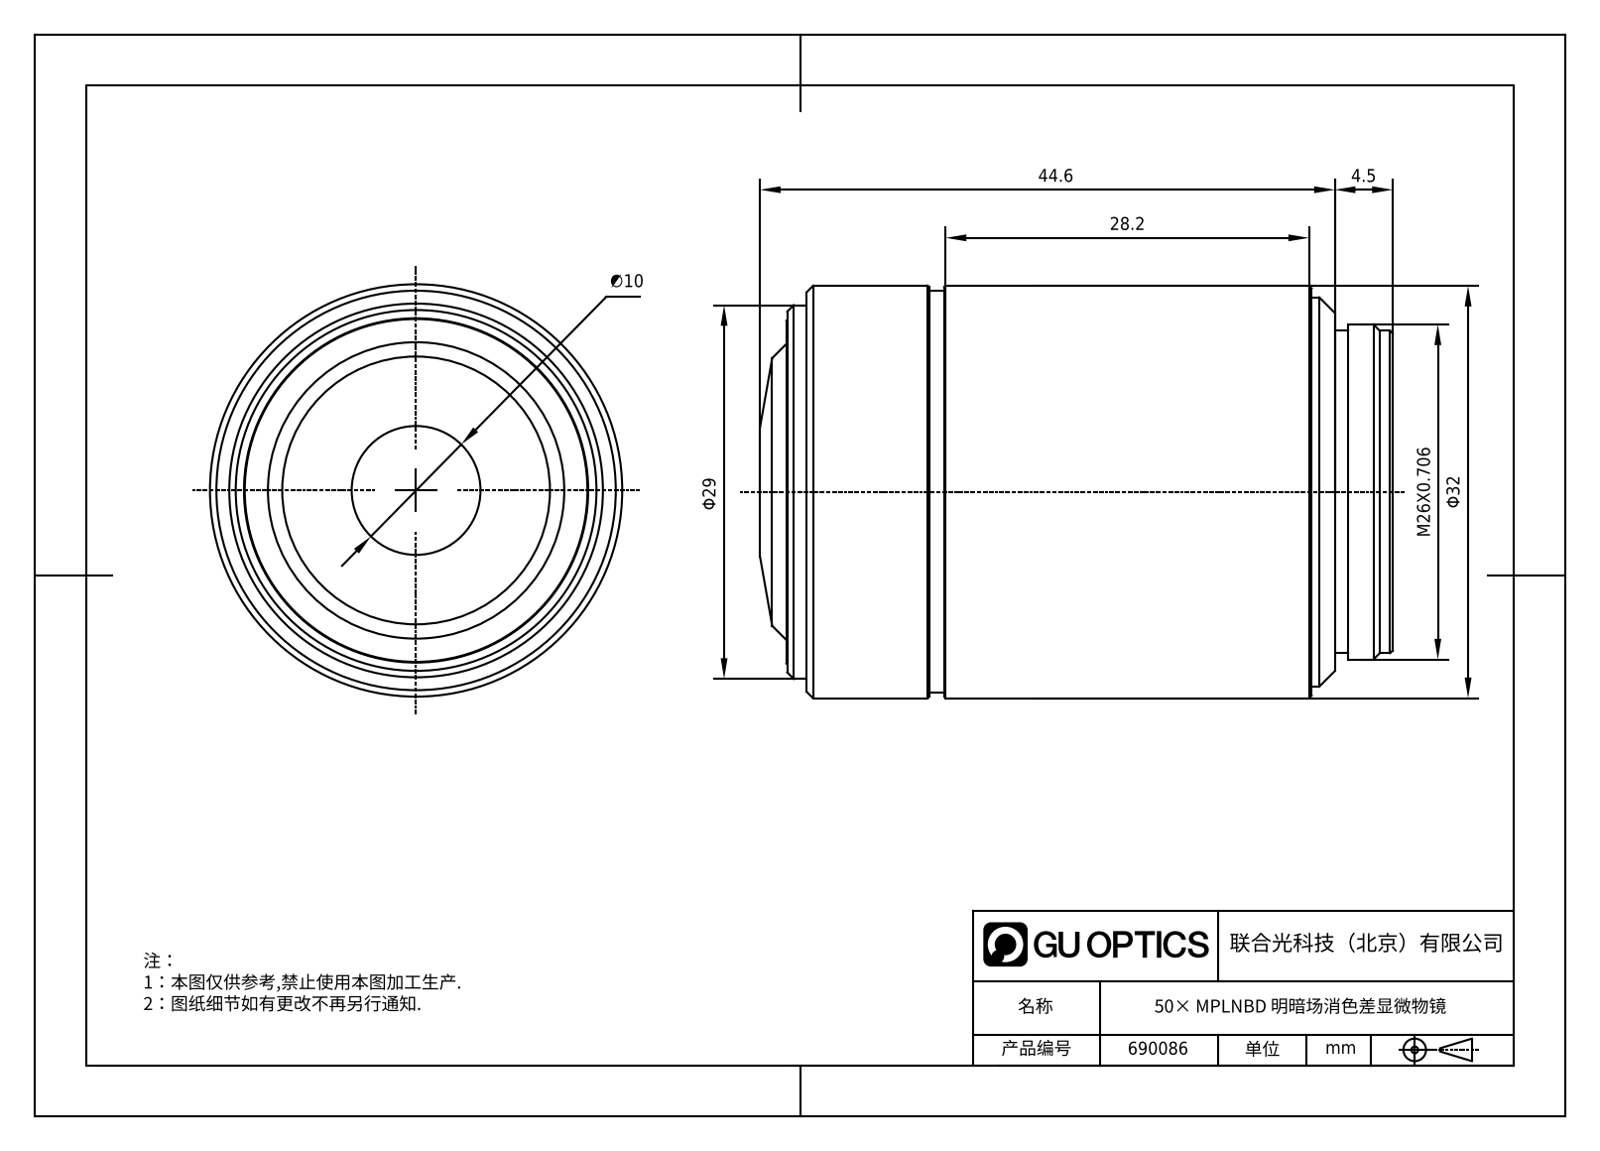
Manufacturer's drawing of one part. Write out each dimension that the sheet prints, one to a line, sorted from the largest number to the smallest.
44.6
Φ32
Φ29
28.2
M26X0.706
∅10
4.5
